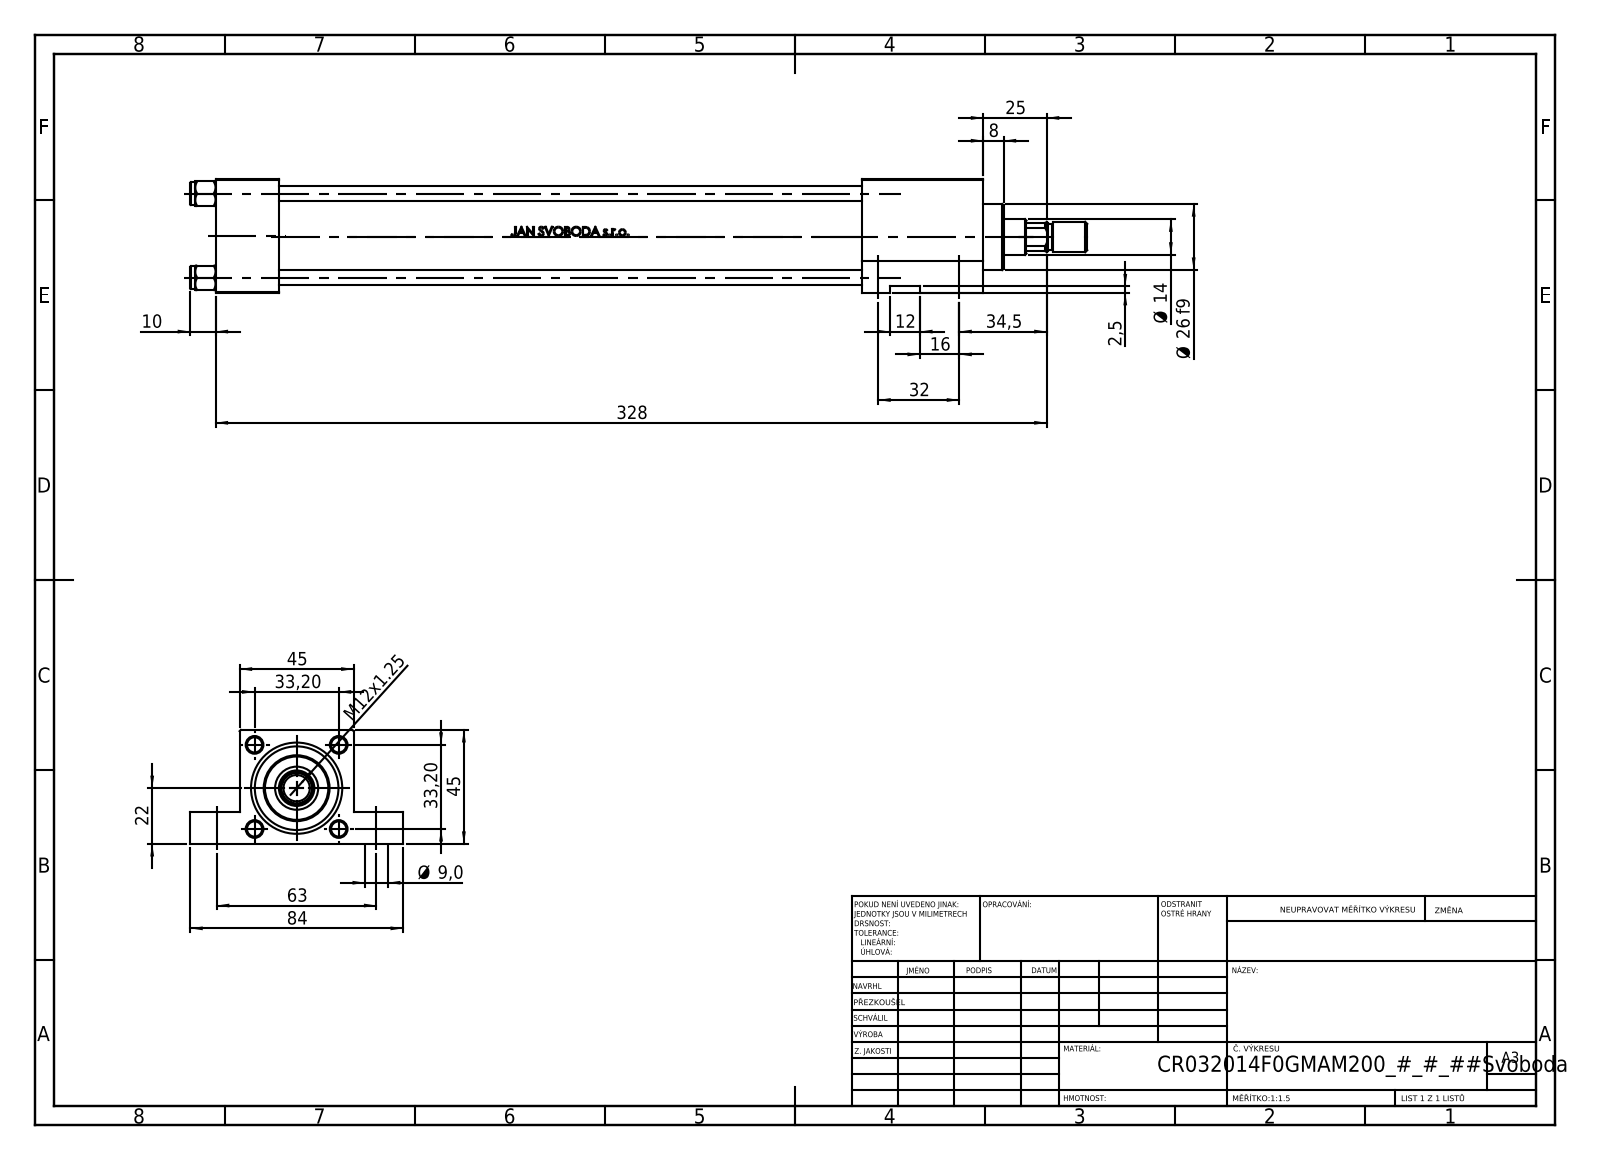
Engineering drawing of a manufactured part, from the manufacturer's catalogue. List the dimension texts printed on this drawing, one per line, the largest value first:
328
84
63
45
45
34,5
33,20
33,20
32
Ø 26 f9
25
22
16
Ø 14
12
M12x1.25
10
Ø 9,0
8
2,5
